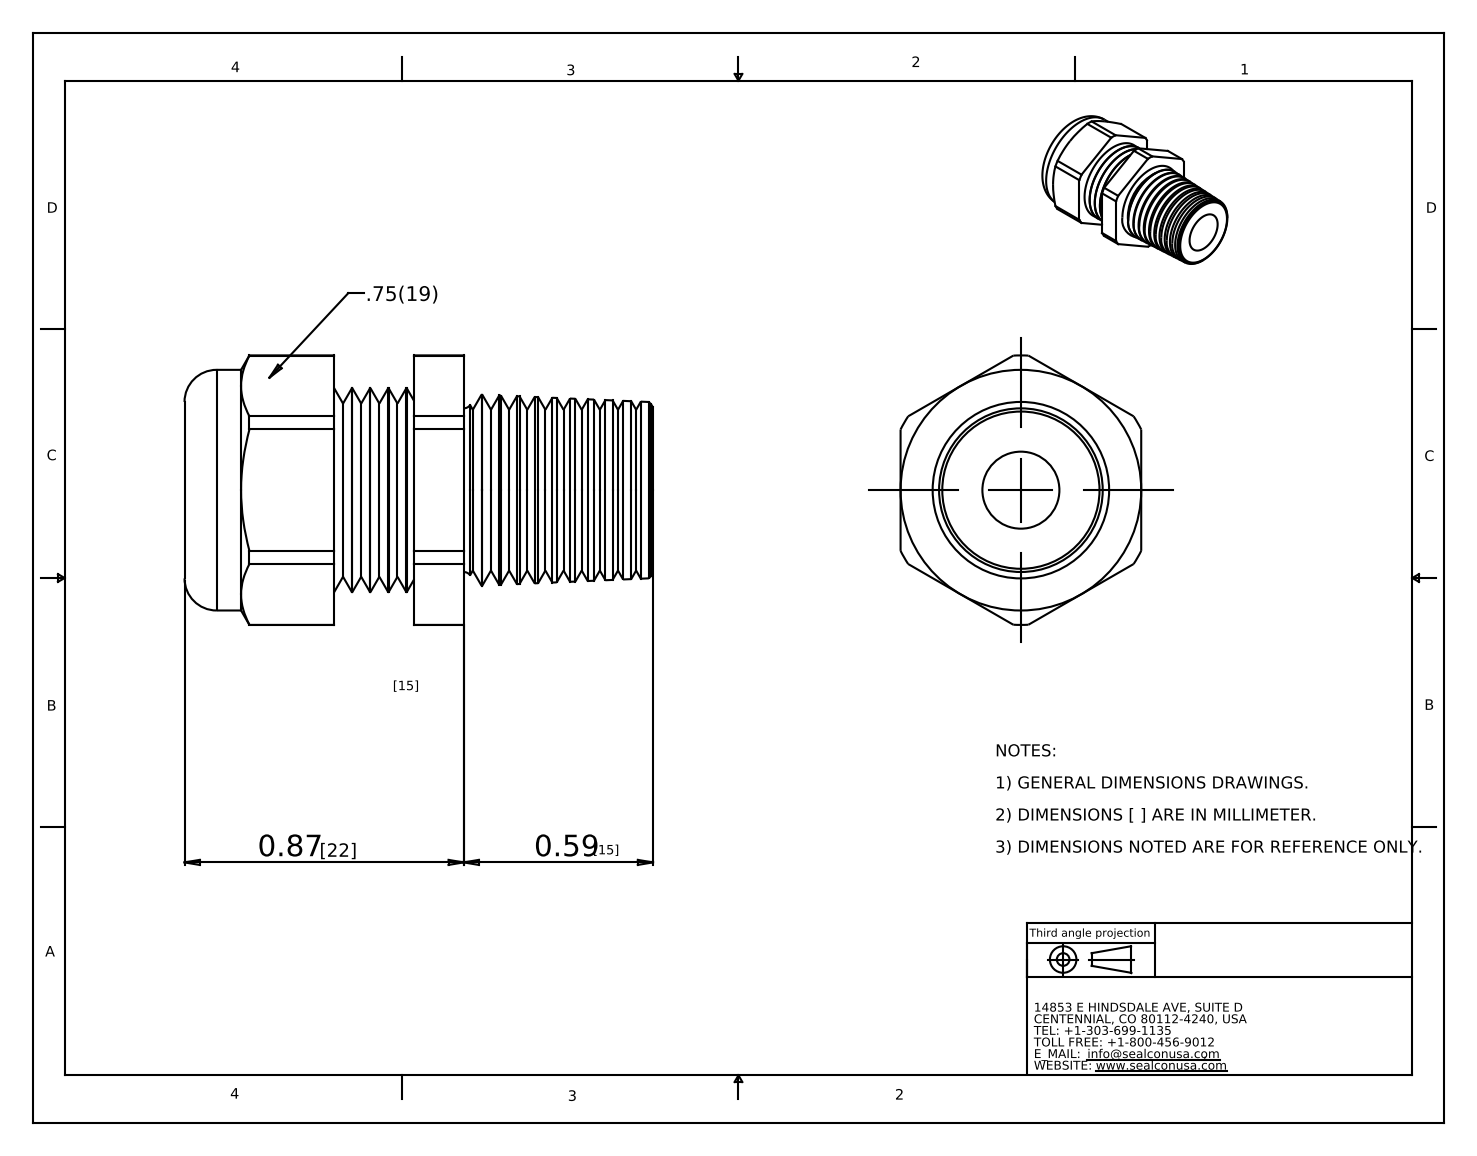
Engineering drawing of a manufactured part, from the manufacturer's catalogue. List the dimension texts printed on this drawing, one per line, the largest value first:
0.87
0.59
